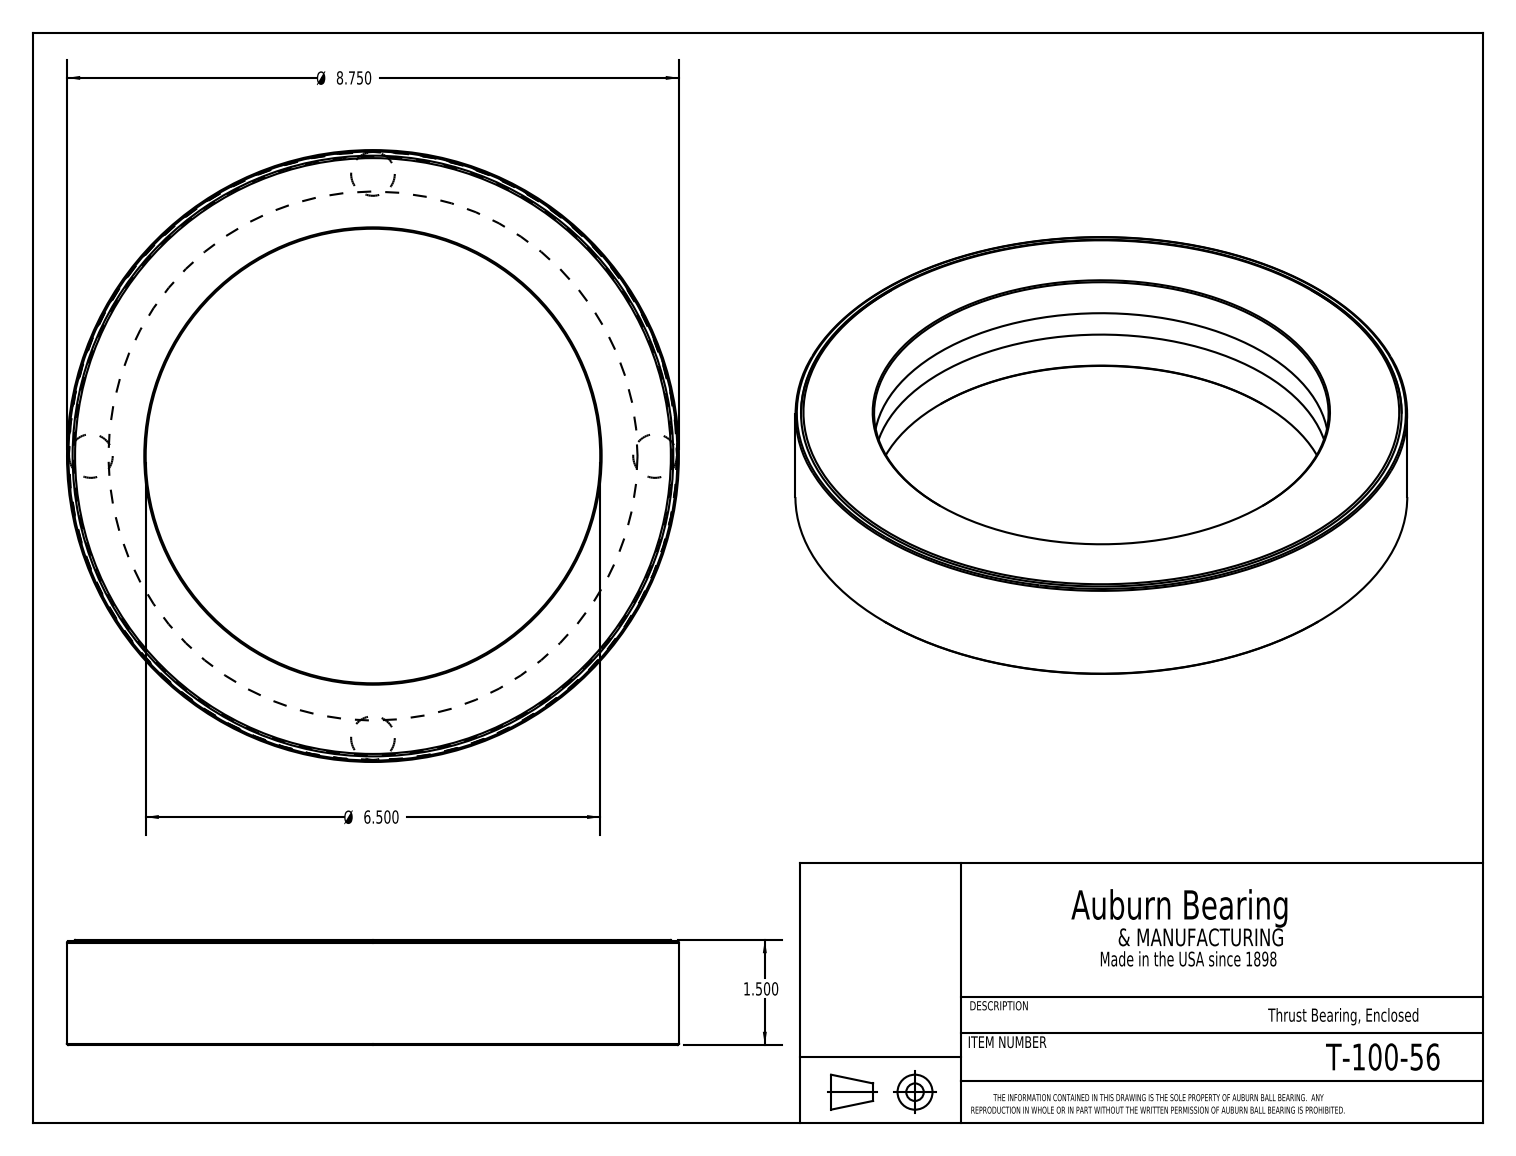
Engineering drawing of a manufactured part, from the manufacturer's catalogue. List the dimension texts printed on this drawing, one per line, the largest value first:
Ø 8.750
Ø 6.500
1.500
